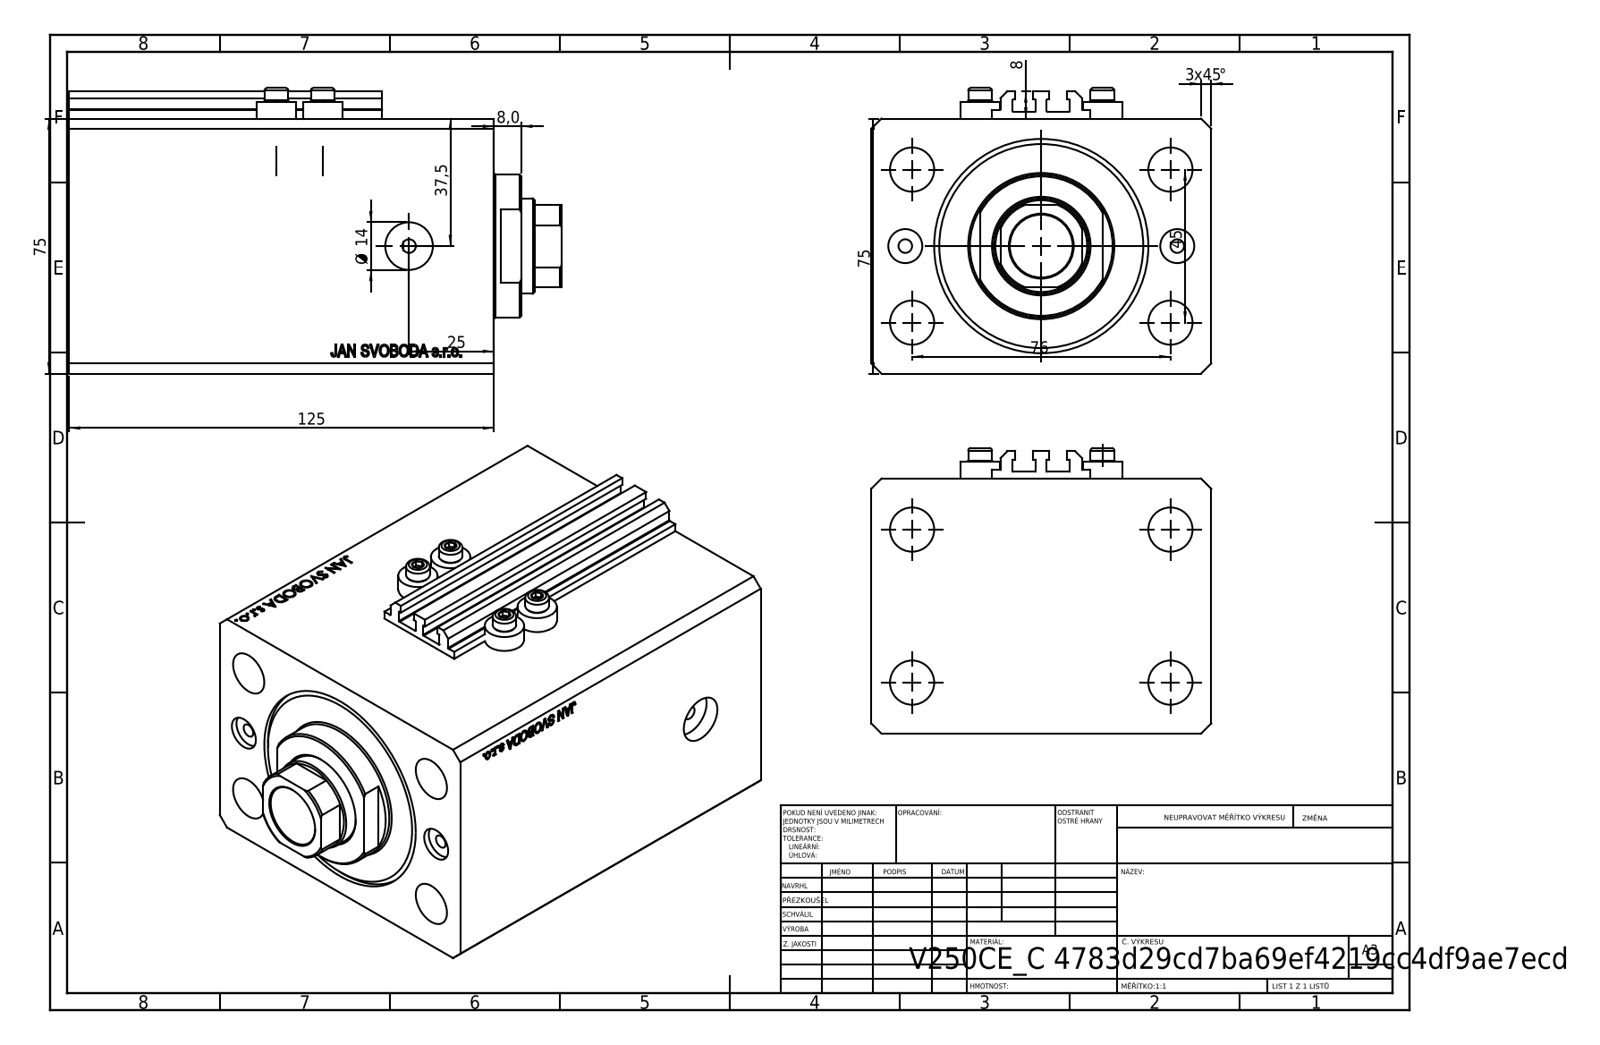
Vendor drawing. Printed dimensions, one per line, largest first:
125
76
75
75
3 x45 °
45
37,5
25
Ø 14
8
8,0
